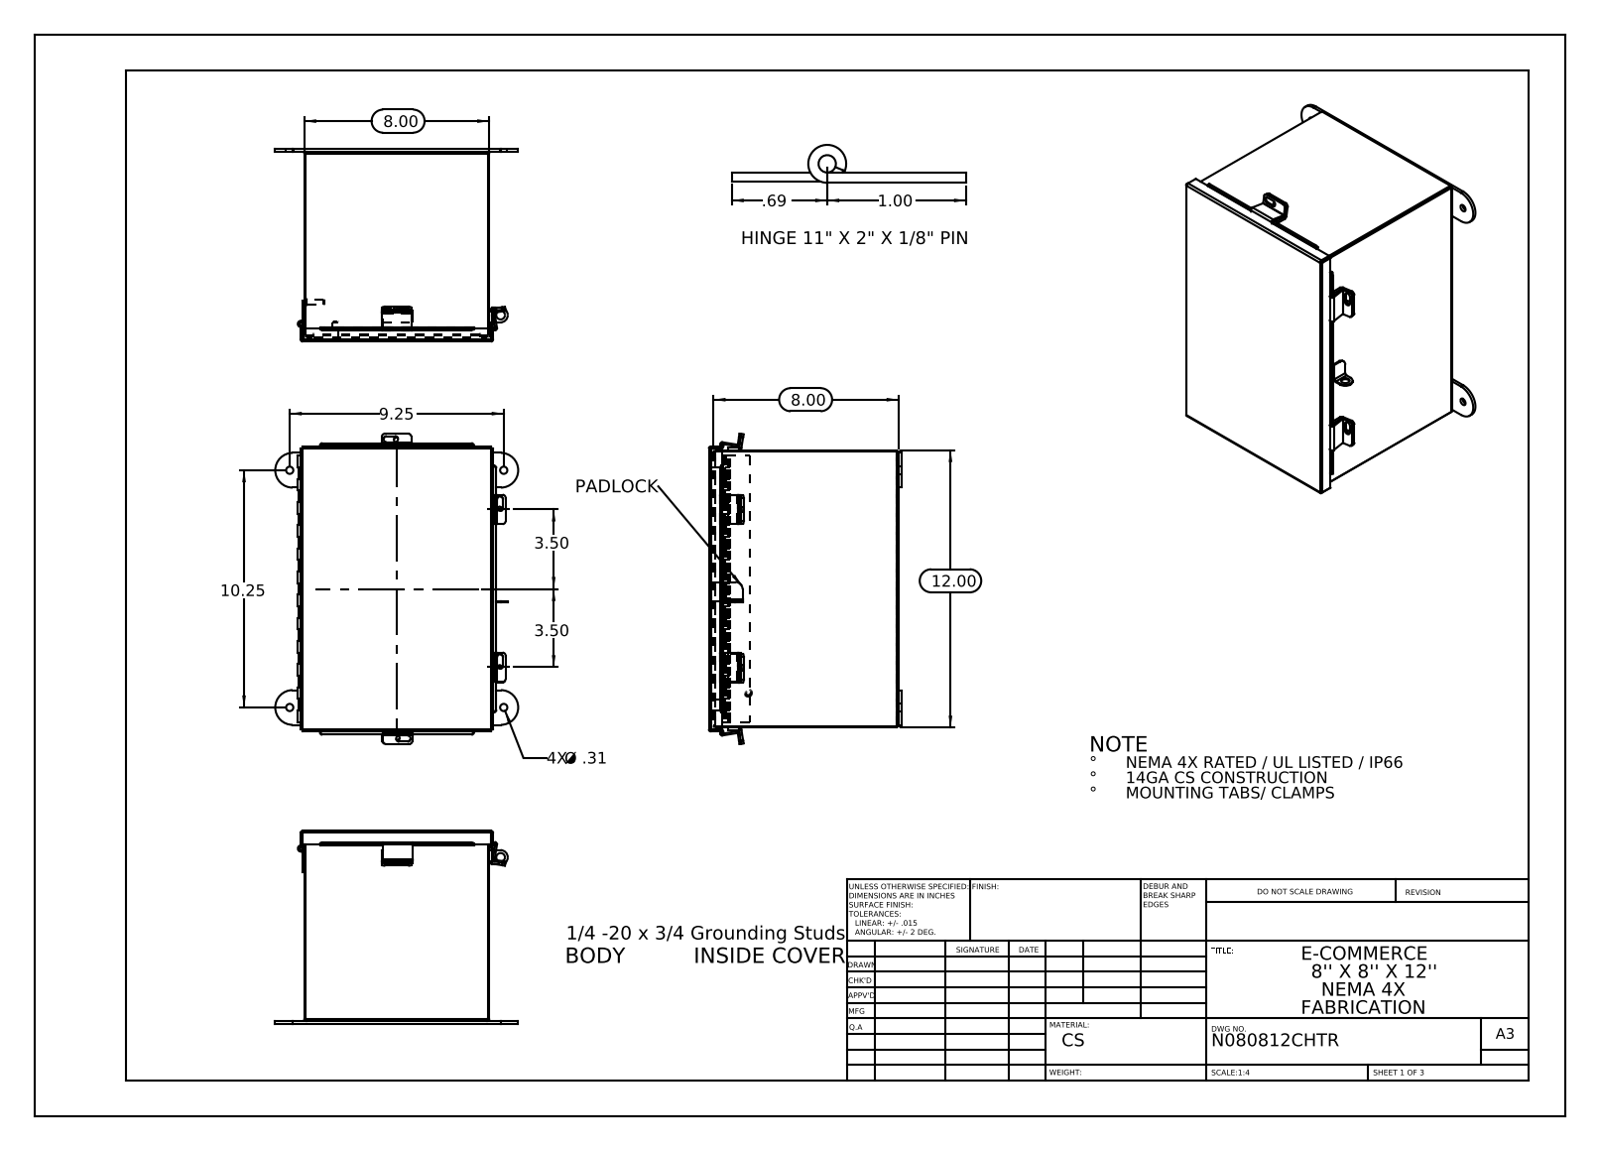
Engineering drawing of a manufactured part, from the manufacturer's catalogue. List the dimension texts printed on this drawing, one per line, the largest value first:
12.00
10.25
9.25
8.00
8.00
3.50
3.50
1.00
.69
4X Ø .31
